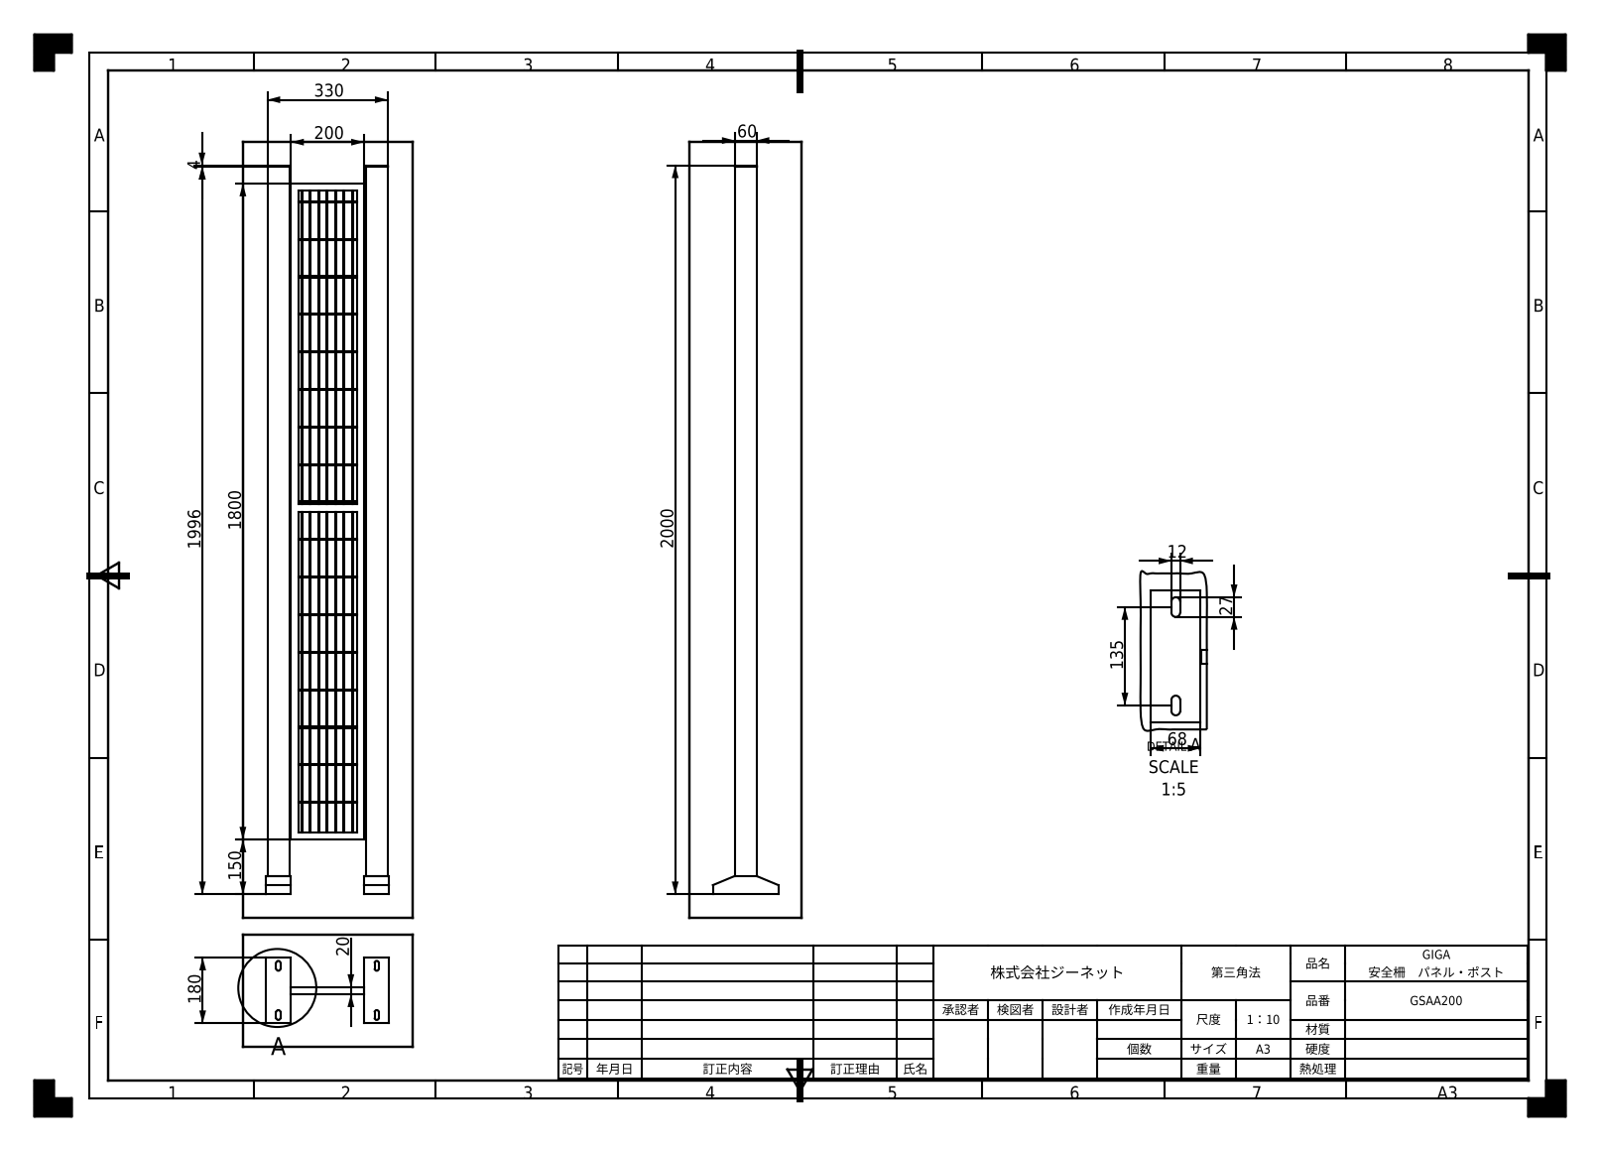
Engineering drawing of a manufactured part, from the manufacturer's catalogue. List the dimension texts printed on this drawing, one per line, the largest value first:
2000
1996
1800
330
200
180
150
135
68
60
27
20
12
4
